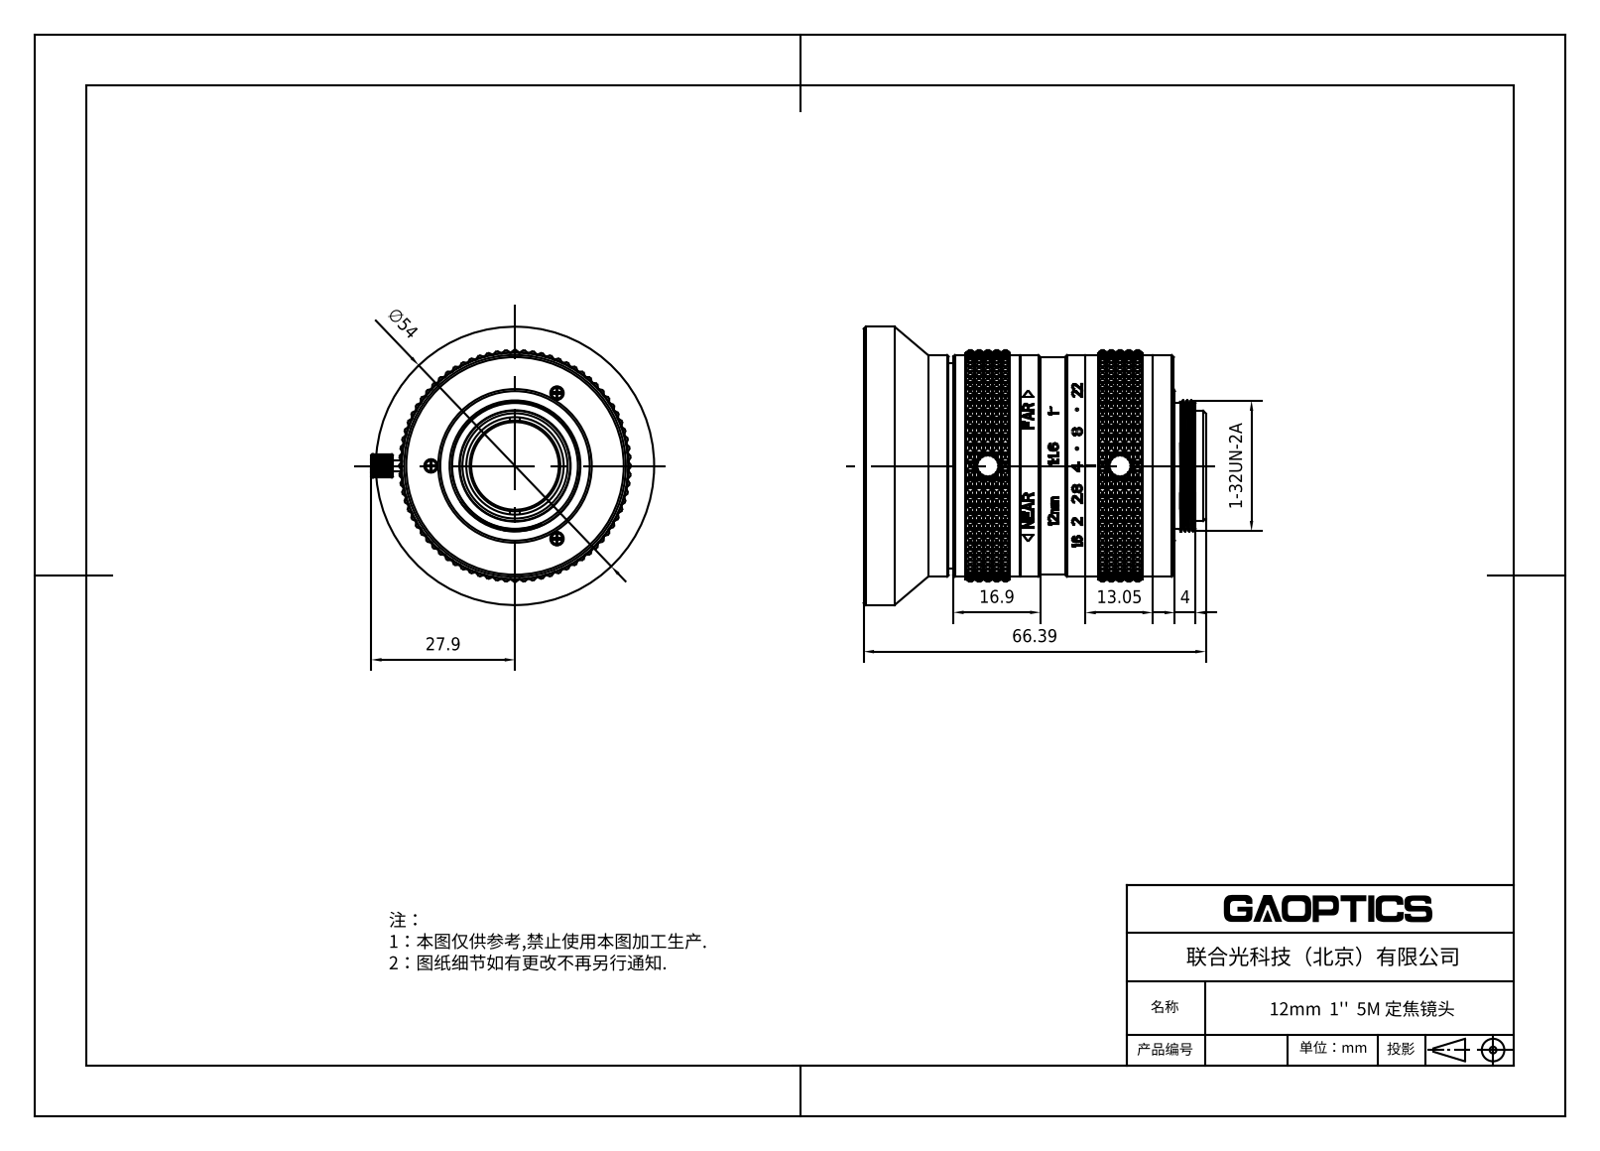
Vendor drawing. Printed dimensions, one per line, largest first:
66.39
∅54
27.9
16.9
13.05
4
1-32UN-2A
